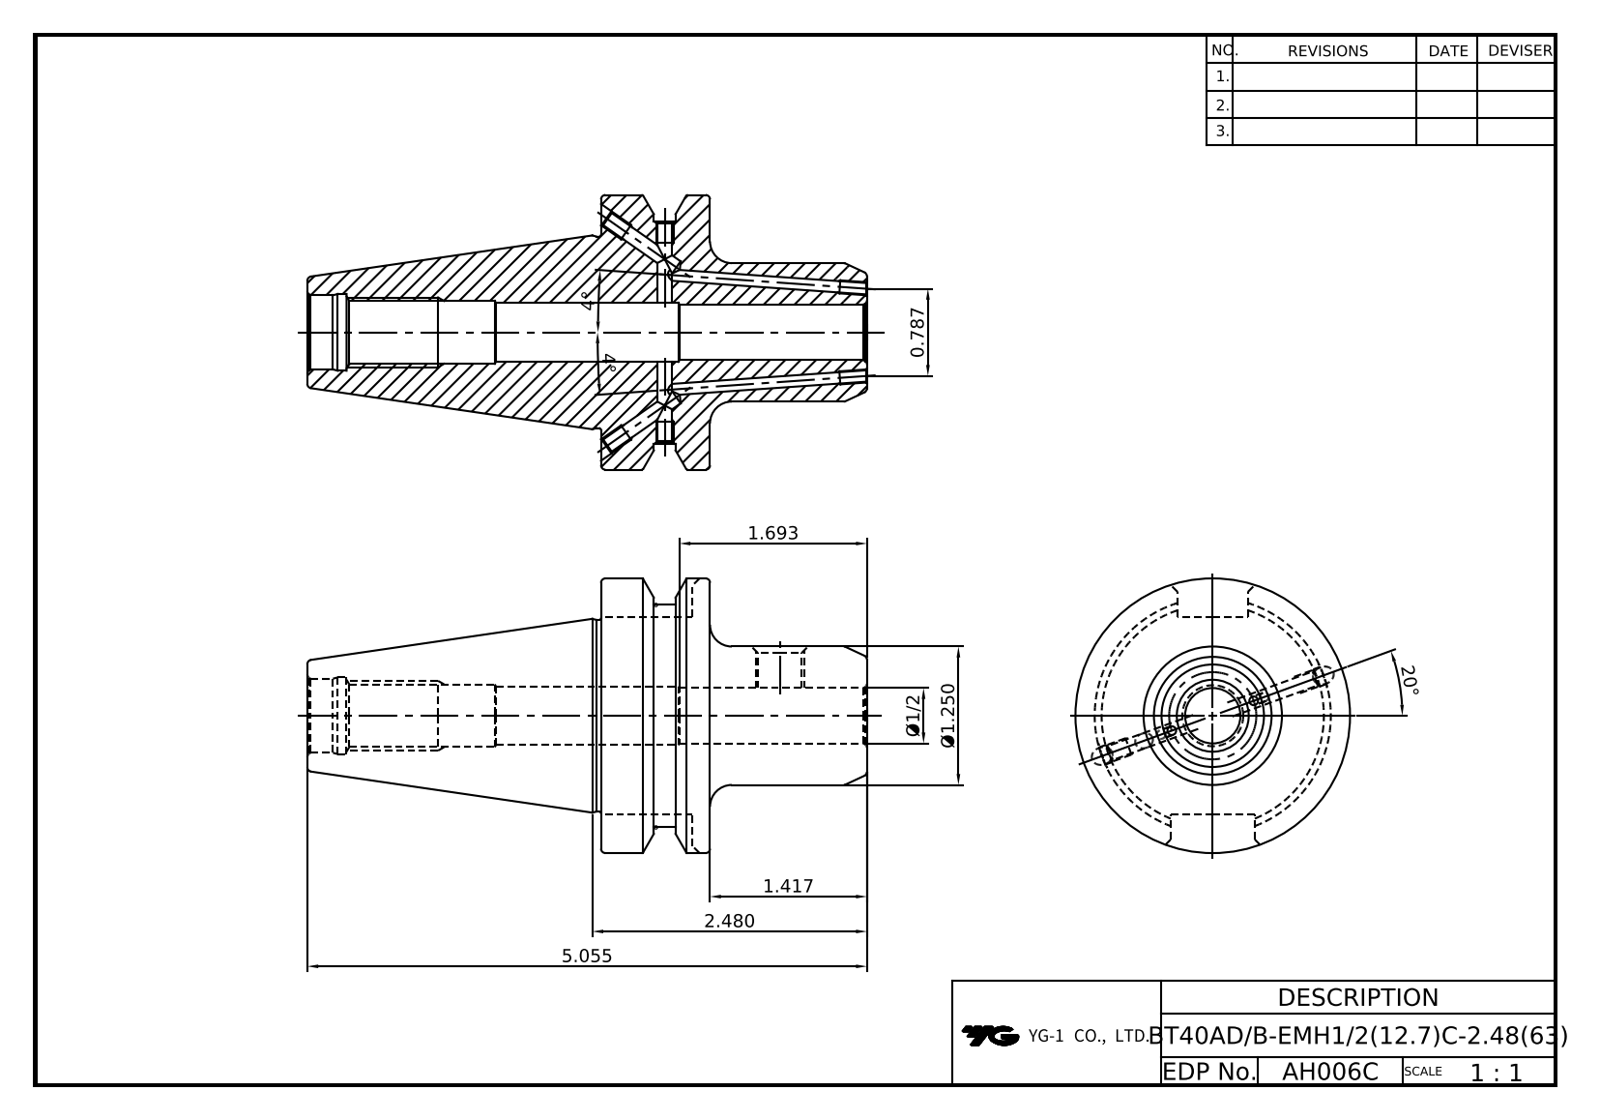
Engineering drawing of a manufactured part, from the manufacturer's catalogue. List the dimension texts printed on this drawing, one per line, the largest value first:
20°
5.055
4°
4°
2.480
1.693
1.417
Ø1.250
0.787
Ø1/2
